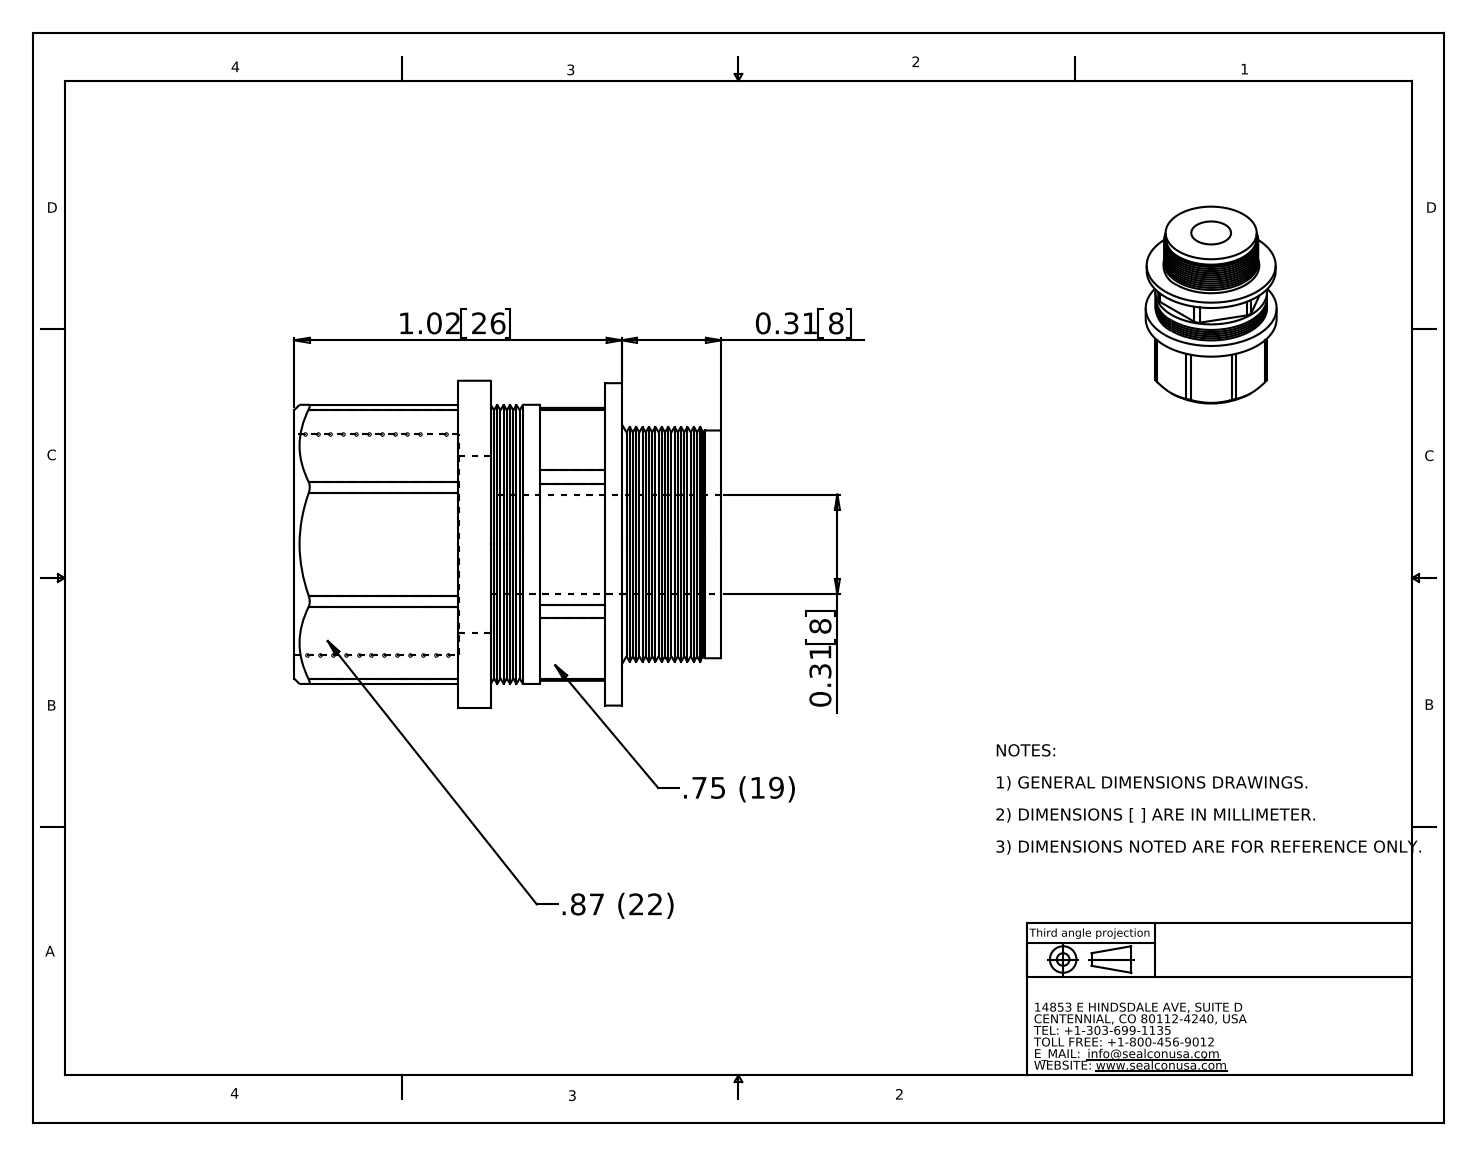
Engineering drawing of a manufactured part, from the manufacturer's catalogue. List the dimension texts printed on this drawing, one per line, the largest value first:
1.02 26
0.31 8
0.31 8
